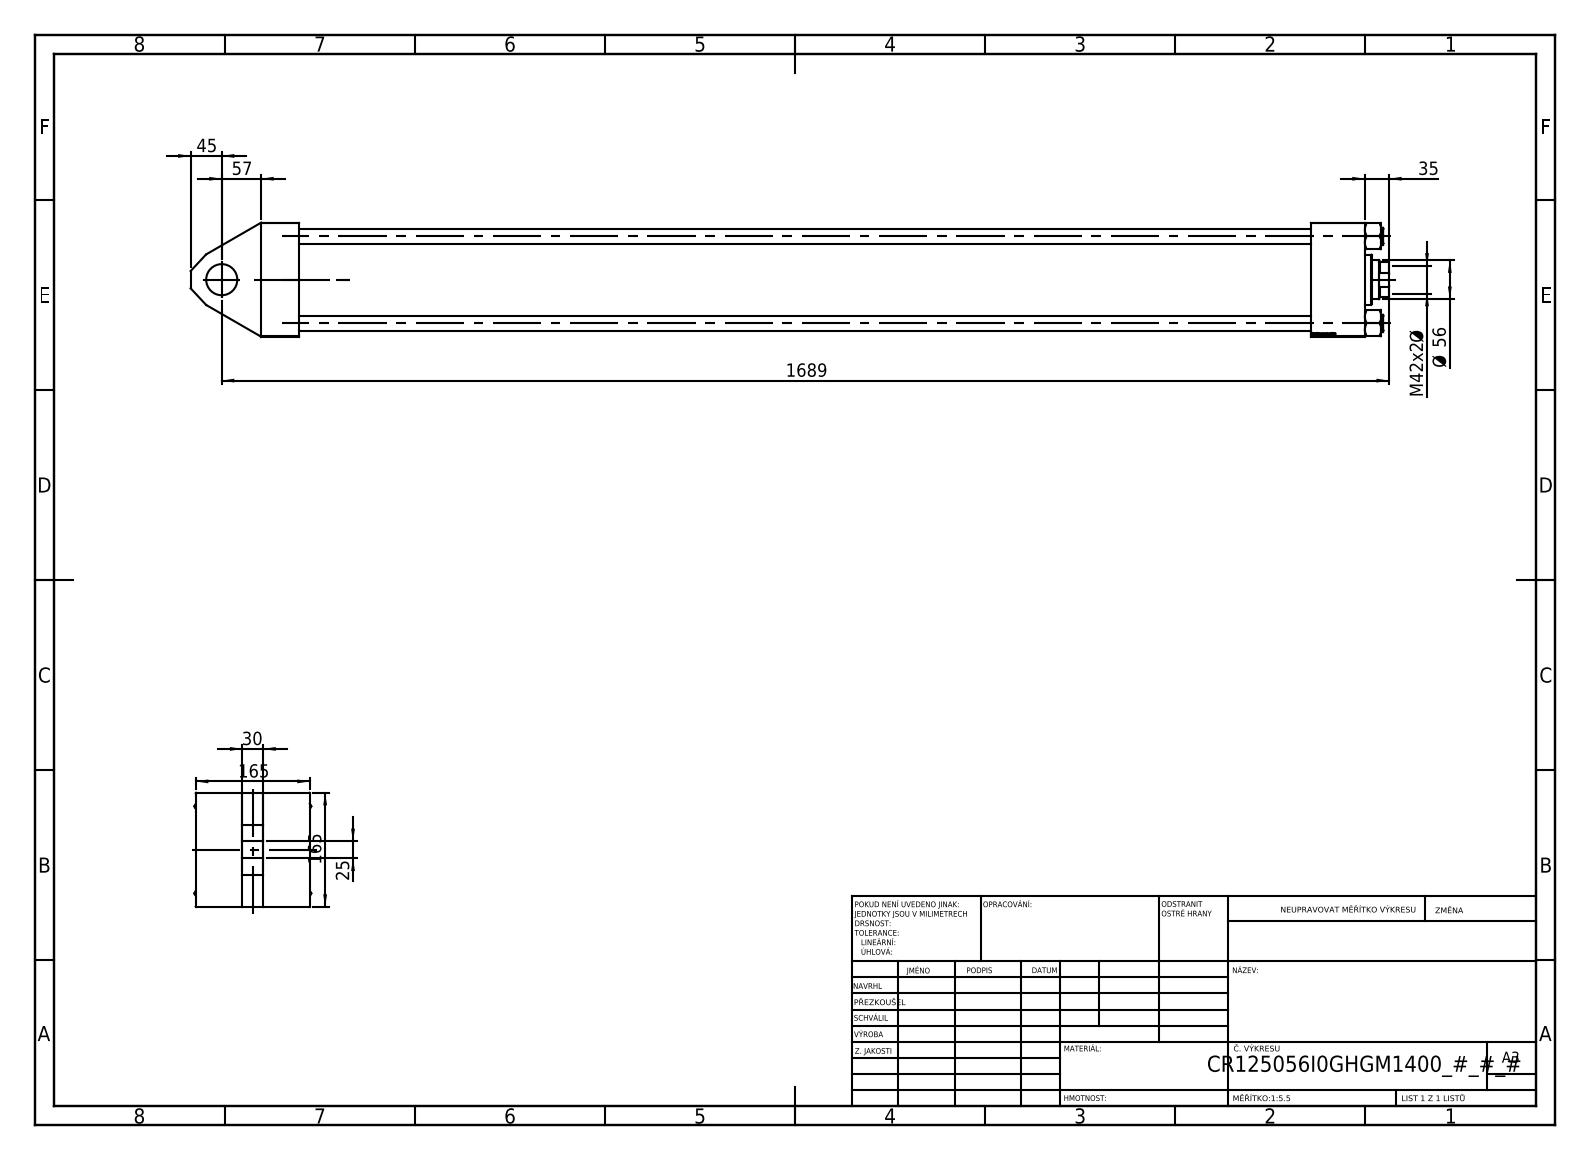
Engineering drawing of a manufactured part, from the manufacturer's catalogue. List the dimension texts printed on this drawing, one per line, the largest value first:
1689
165
165
57
Ø 56
45
M42x2 Ø
35
30
25
